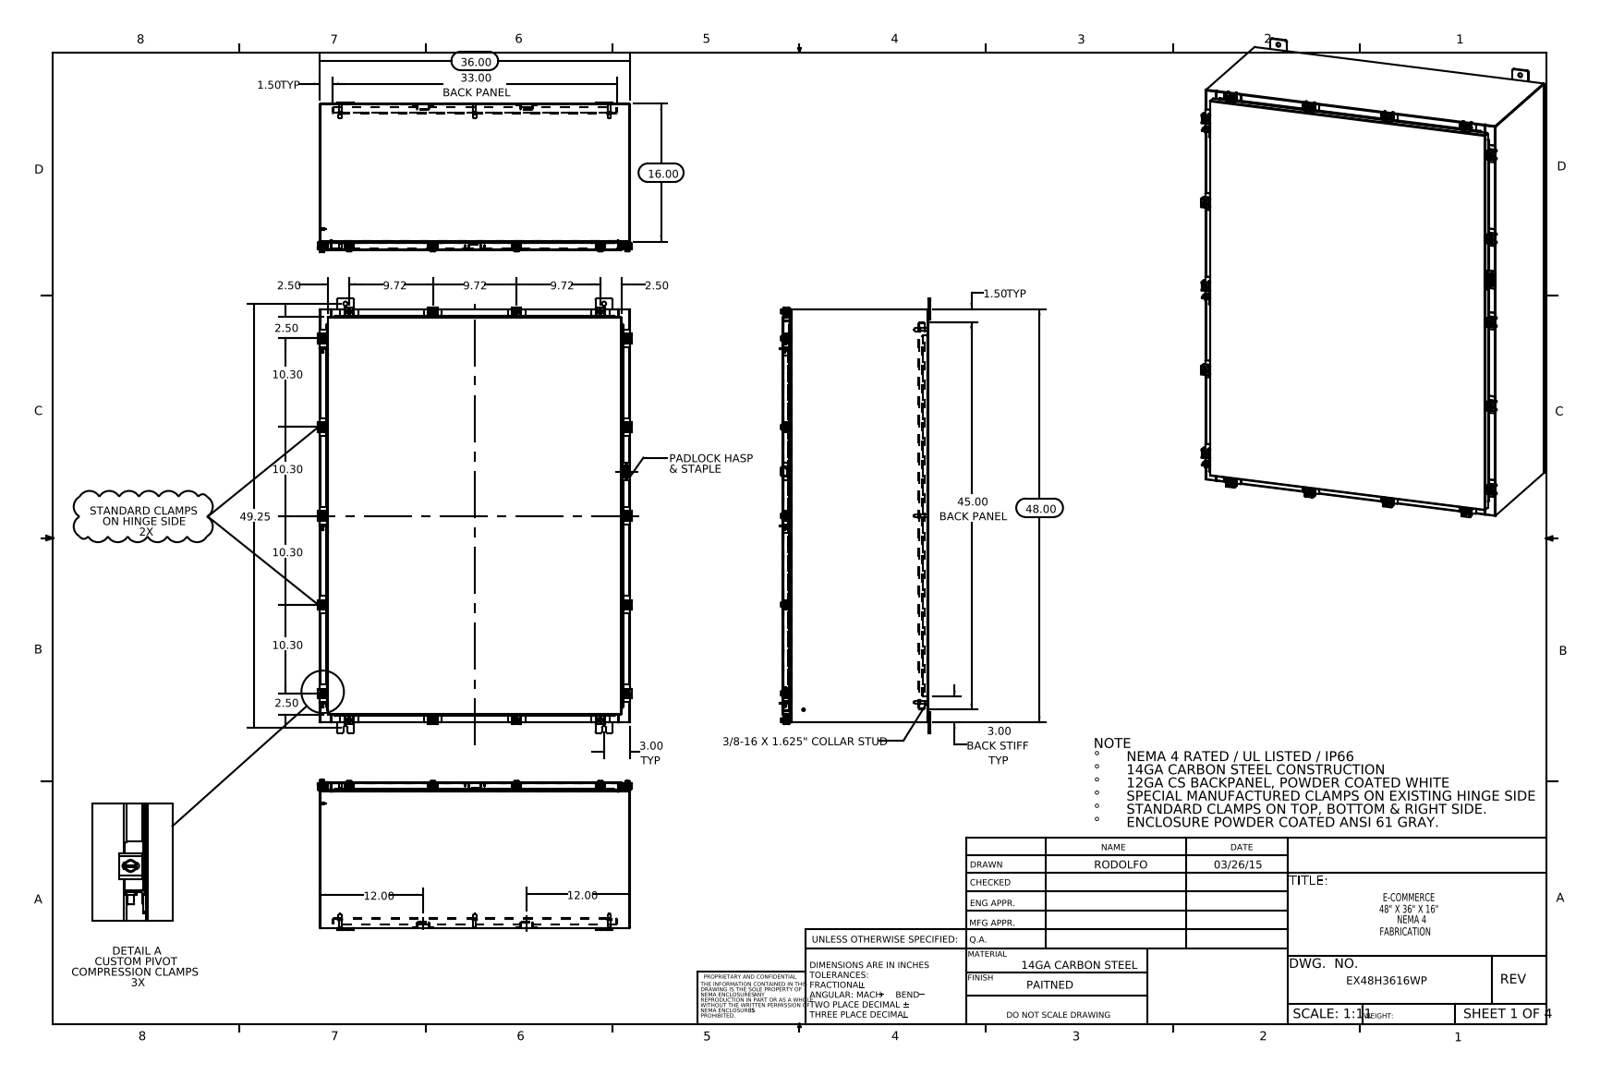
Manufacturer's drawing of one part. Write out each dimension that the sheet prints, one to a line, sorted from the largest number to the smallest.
49.25
48.00
45.00 BACK PANEL
36.00
33.00 BACK PANEL
16.00
12.00
12.00
10.30
10.30
10.30
10.30
9.72
9.72
9.72
3.00 TYP
3.00 BACK STIFF TYP
2.50
2.50
2.50
2.50
1.50 TYP
1.50 TYP
